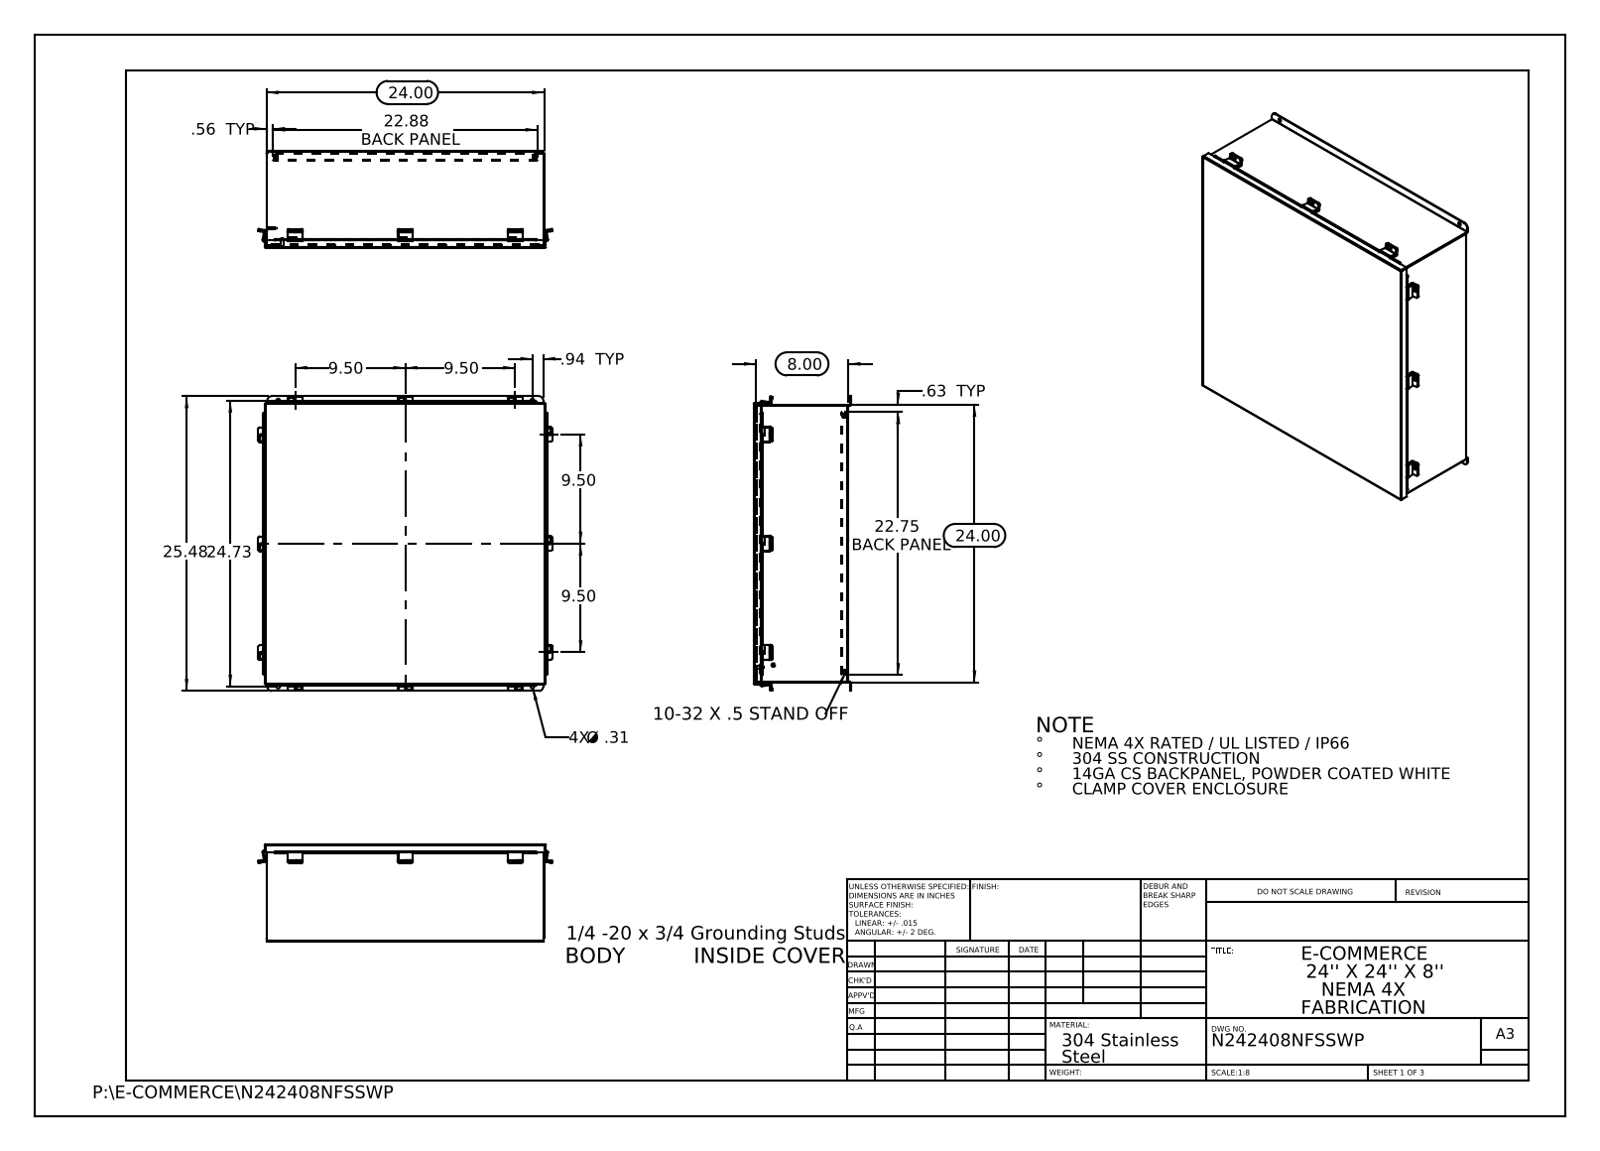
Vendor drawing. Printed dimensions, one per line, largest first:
25.48
24.73
24.00
24.00
22.88 BACK PANEL
22.75 BACK PANEL
9.50
9.50
9.50
9.50
8.00
.94 TYP
.63 TYP
.56 TYP
4X Ø .31
